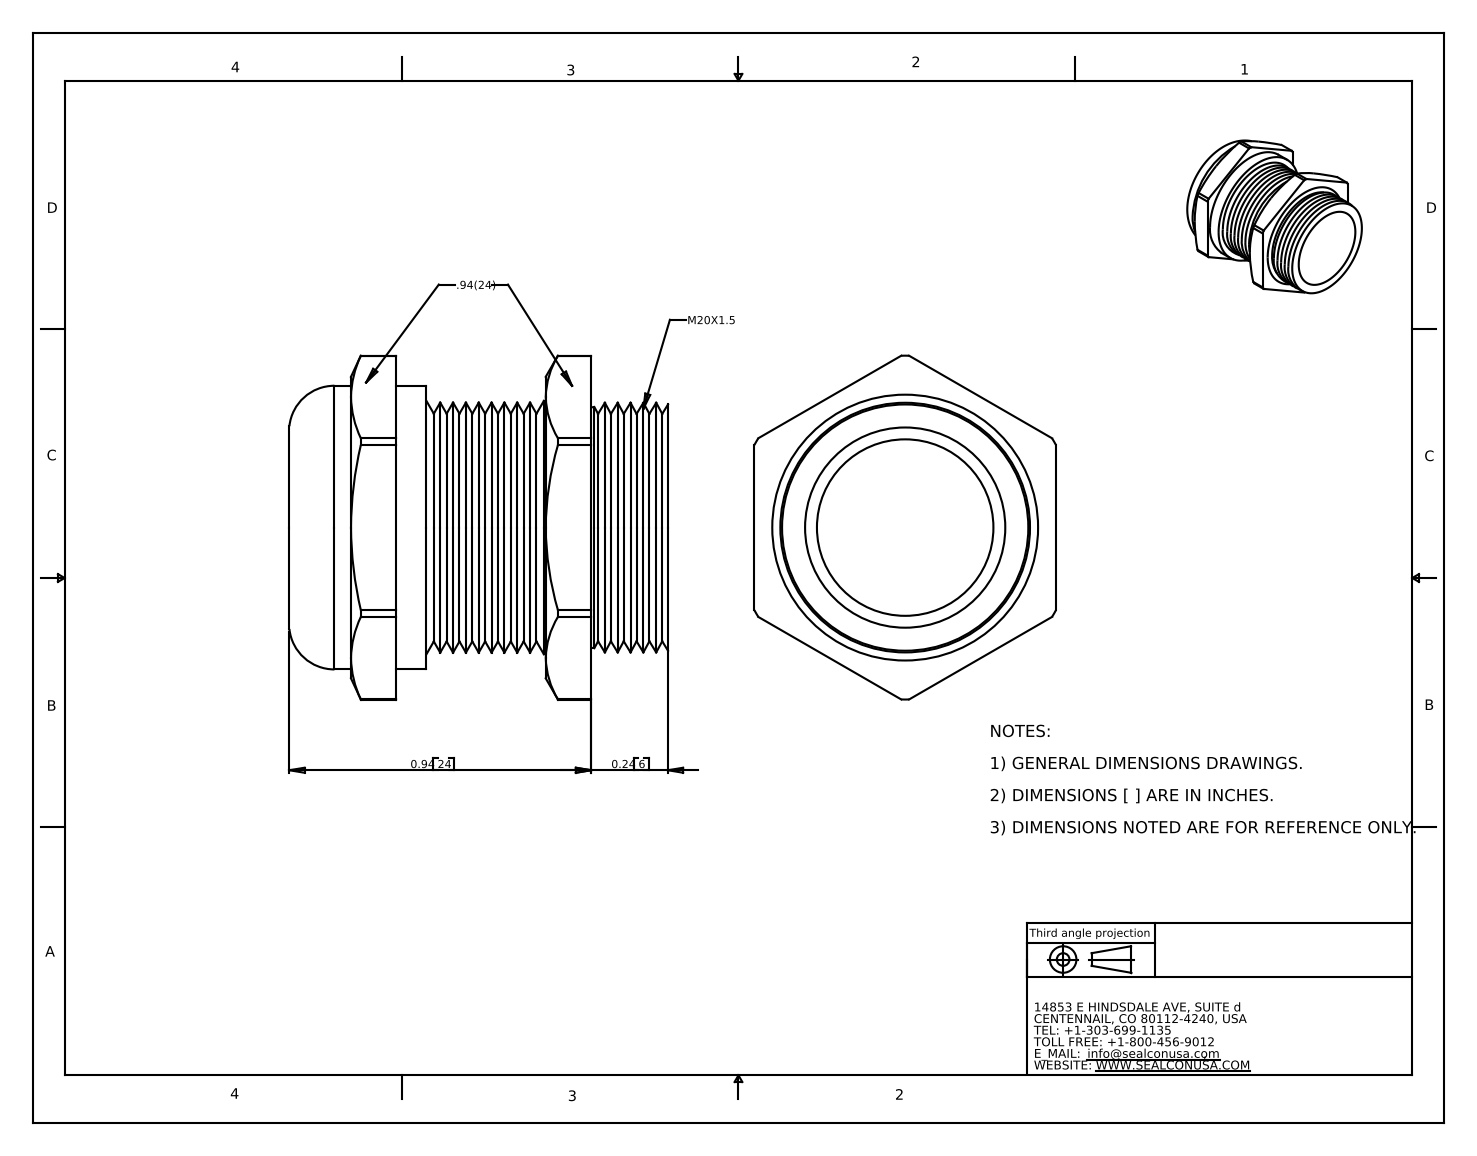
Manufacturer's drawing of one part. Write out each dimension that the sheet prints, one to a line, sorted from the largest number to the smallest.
0.94 24
0.24 6
